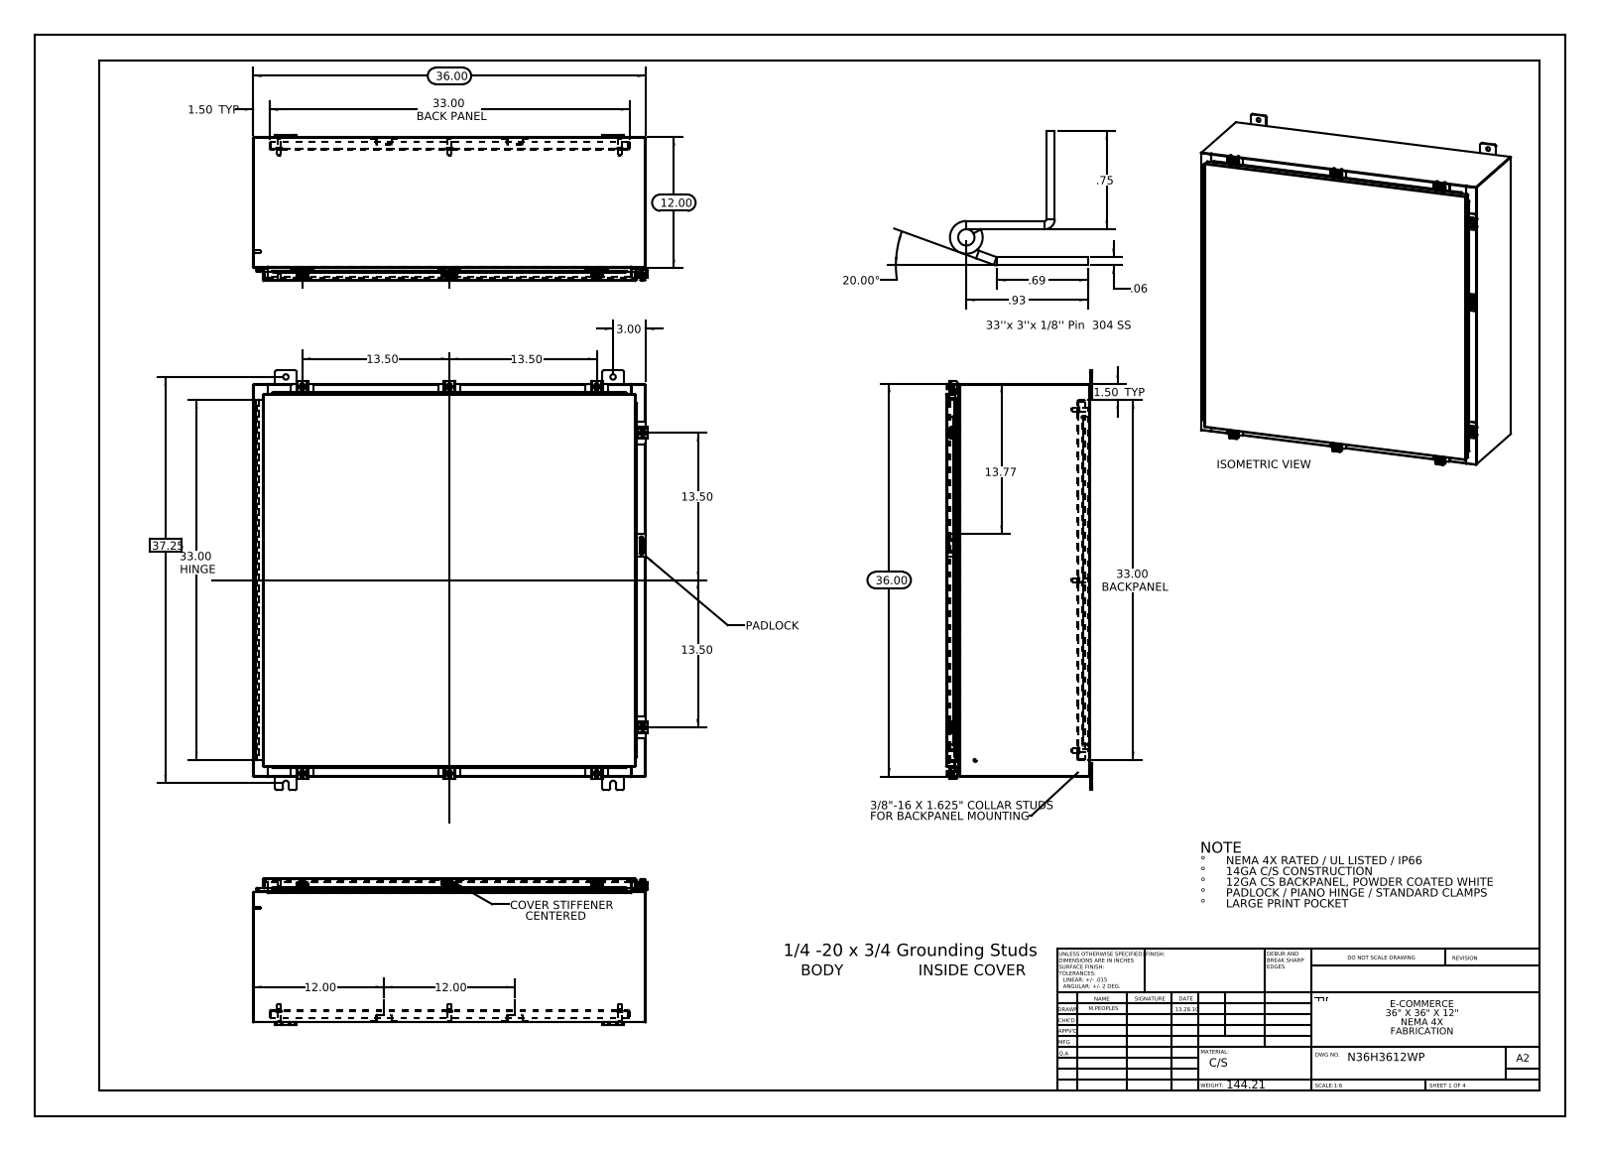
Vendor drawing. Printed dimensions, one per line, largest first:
37.25
36.00
36.00
33.00 HINGE
33.00 BACK PANEL
33.00 BACKPANEL
20.00°
13.77
13.50
13.50
13.50
13.50
12.00
12.00
12.00
3.00
1.50 TYP
1.50 TYP
.93
.75
.69
.06
